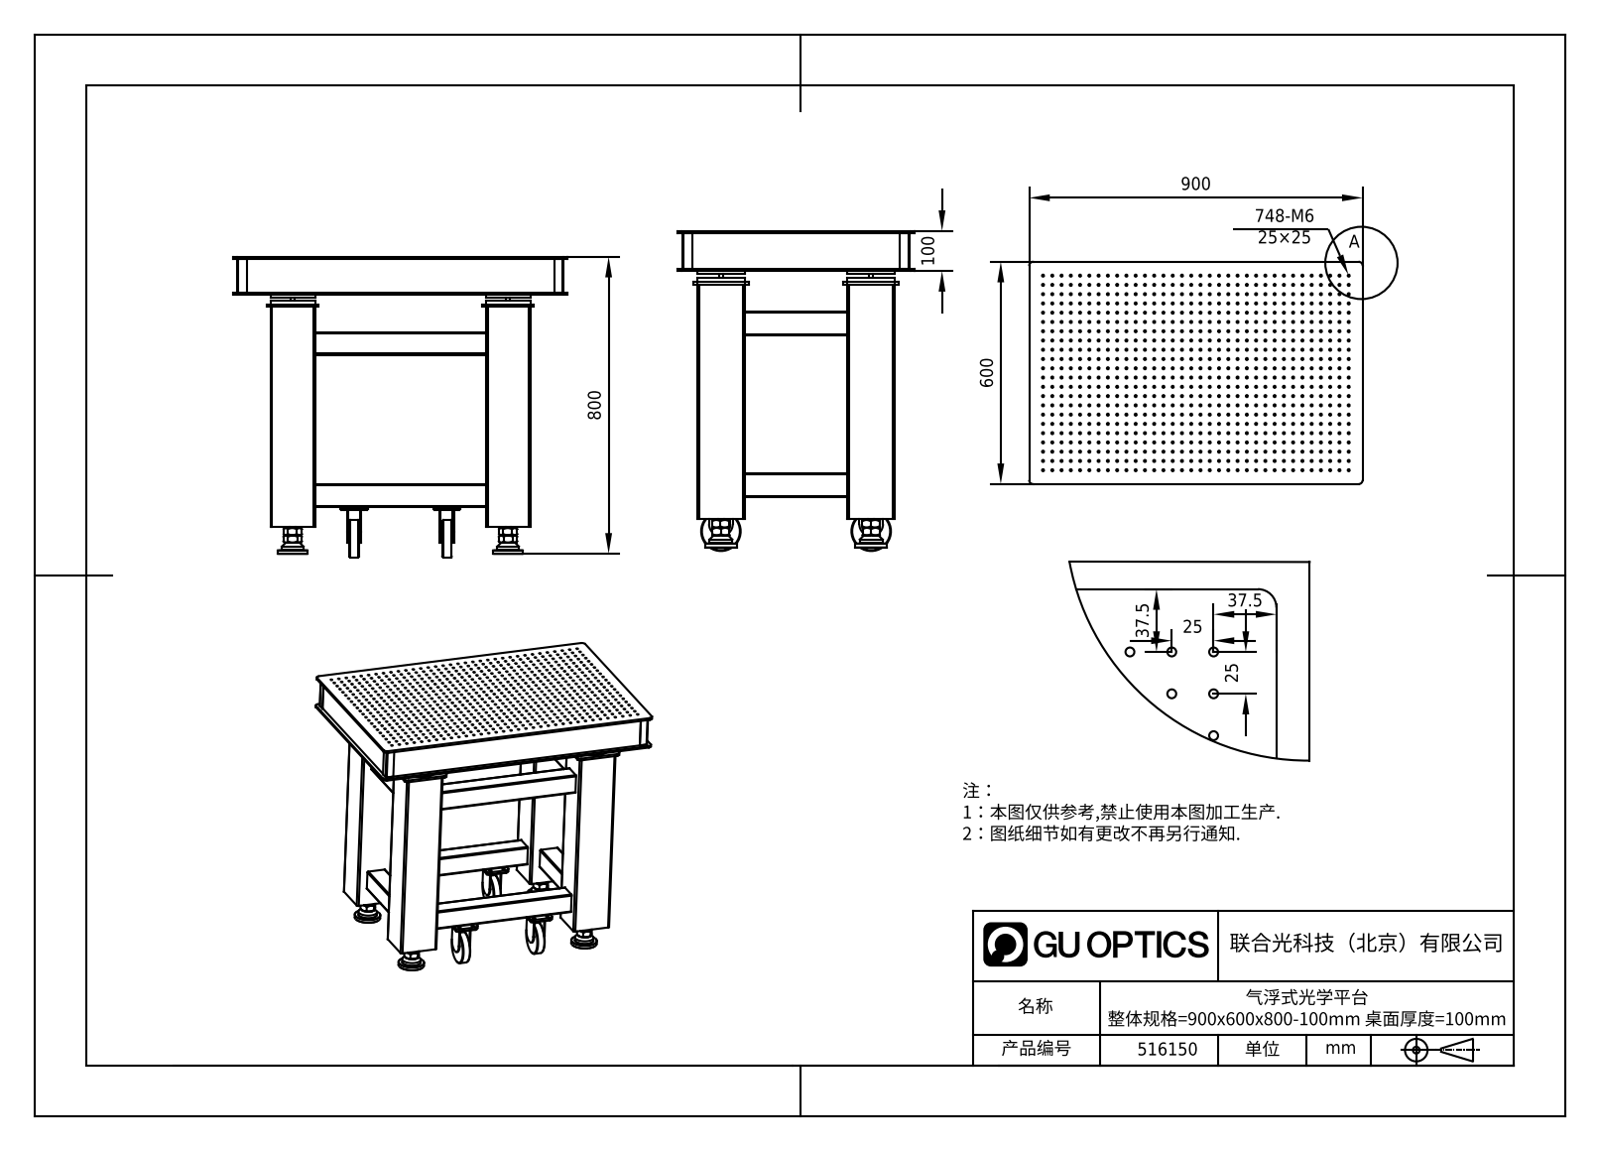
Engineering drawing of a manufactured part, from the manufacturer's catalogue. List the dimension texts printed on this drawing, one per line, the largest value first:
900
800
600
100
37.5
37.5
25
25
